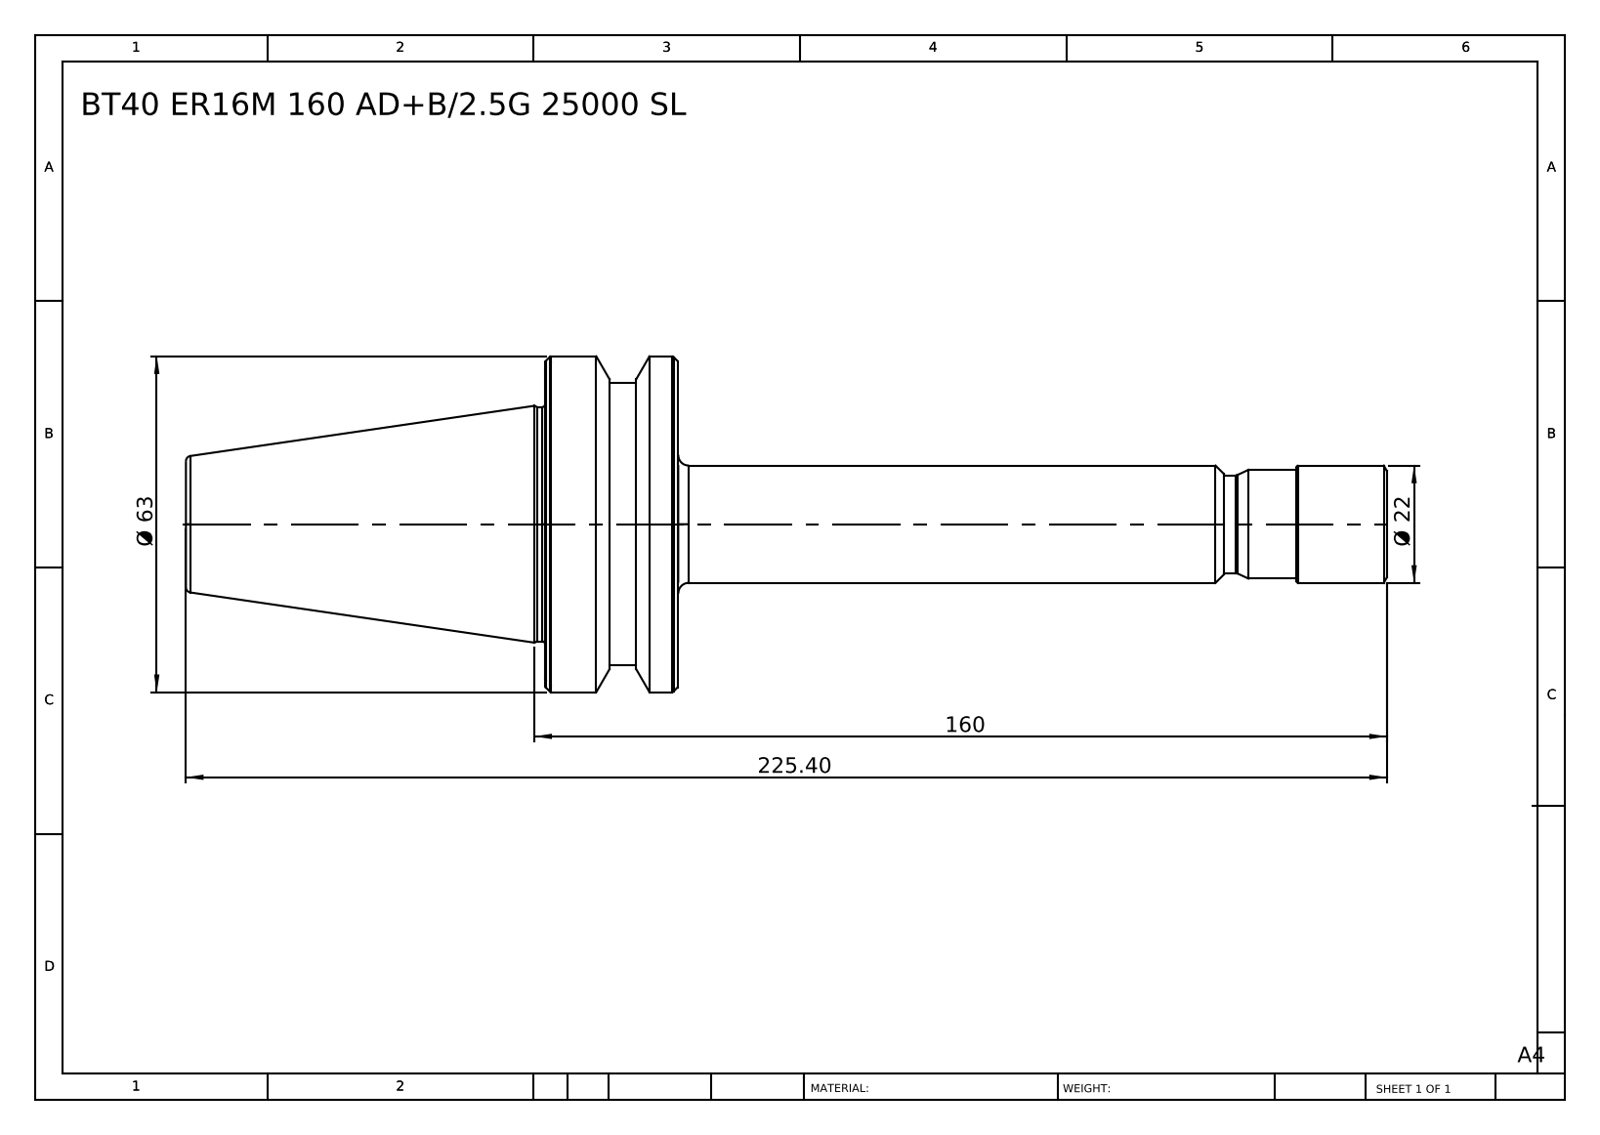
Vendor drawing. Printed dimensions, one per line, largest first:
225.40
160
Ø 63
Ø 22
